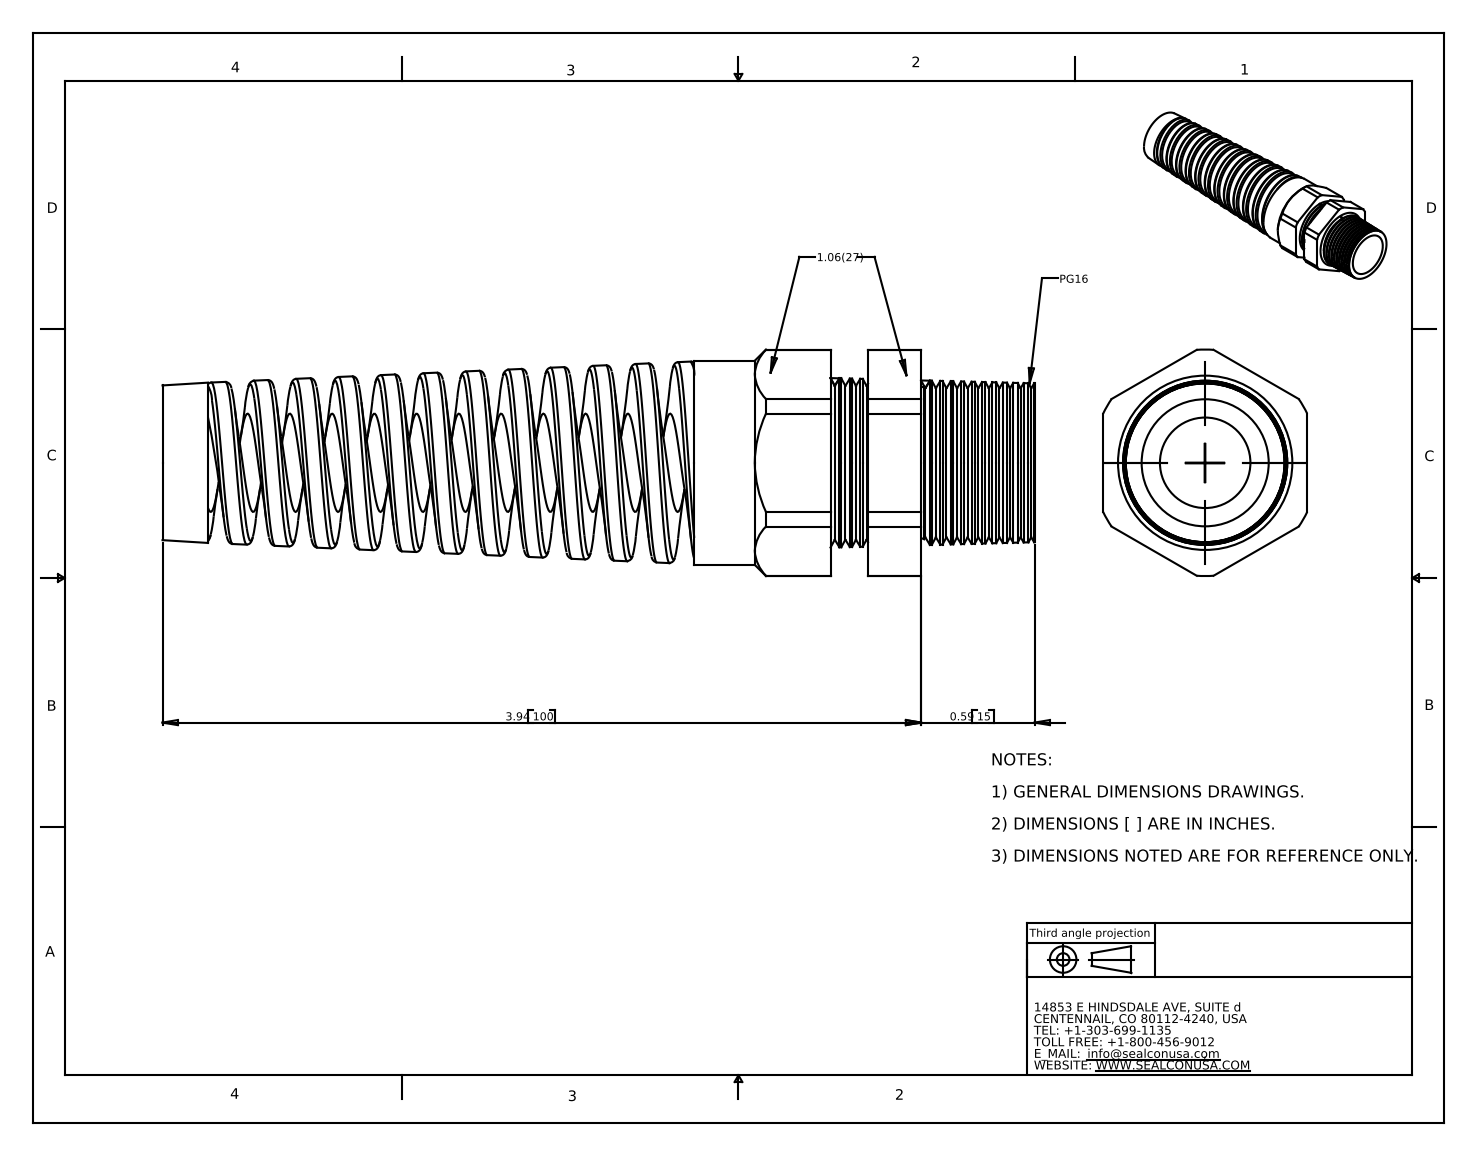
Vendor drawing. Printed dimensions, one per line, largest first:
3.94 100
0.59 15
